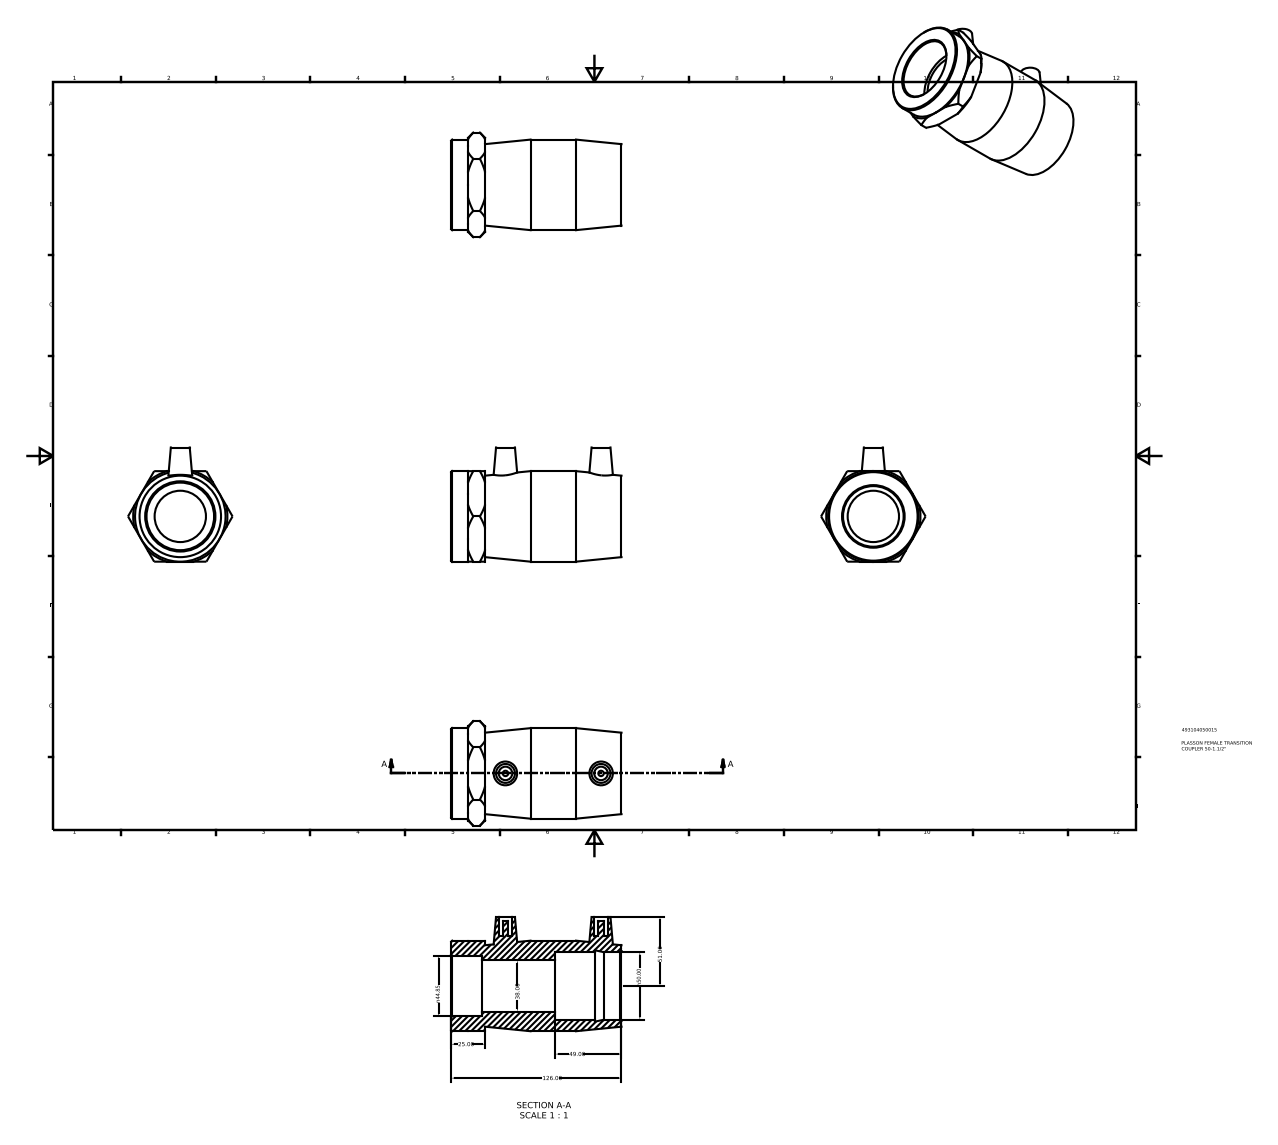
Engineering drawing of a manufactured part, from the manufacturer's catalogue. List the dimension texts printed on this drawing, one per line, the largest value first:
126.00
51.00
n50.00
49.00
n44.85
38.00
25.00
